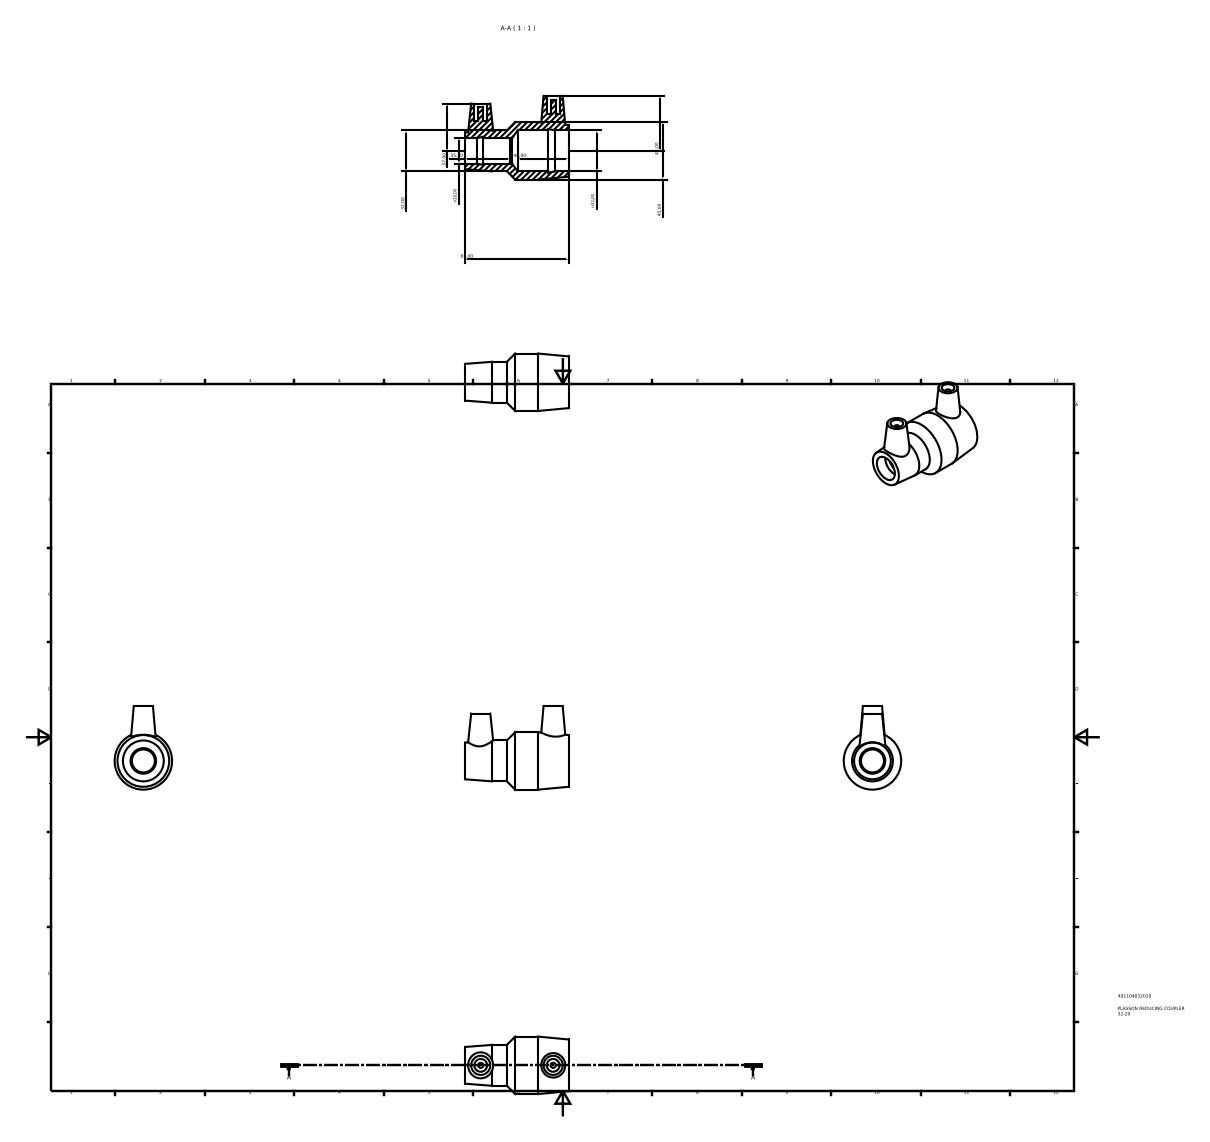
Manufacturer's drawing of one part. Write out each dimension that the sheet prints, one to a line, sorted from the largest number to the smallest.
81,00
45,00
43,00
40,00
37,00
35,00
n32,00
32,00
n20,00
